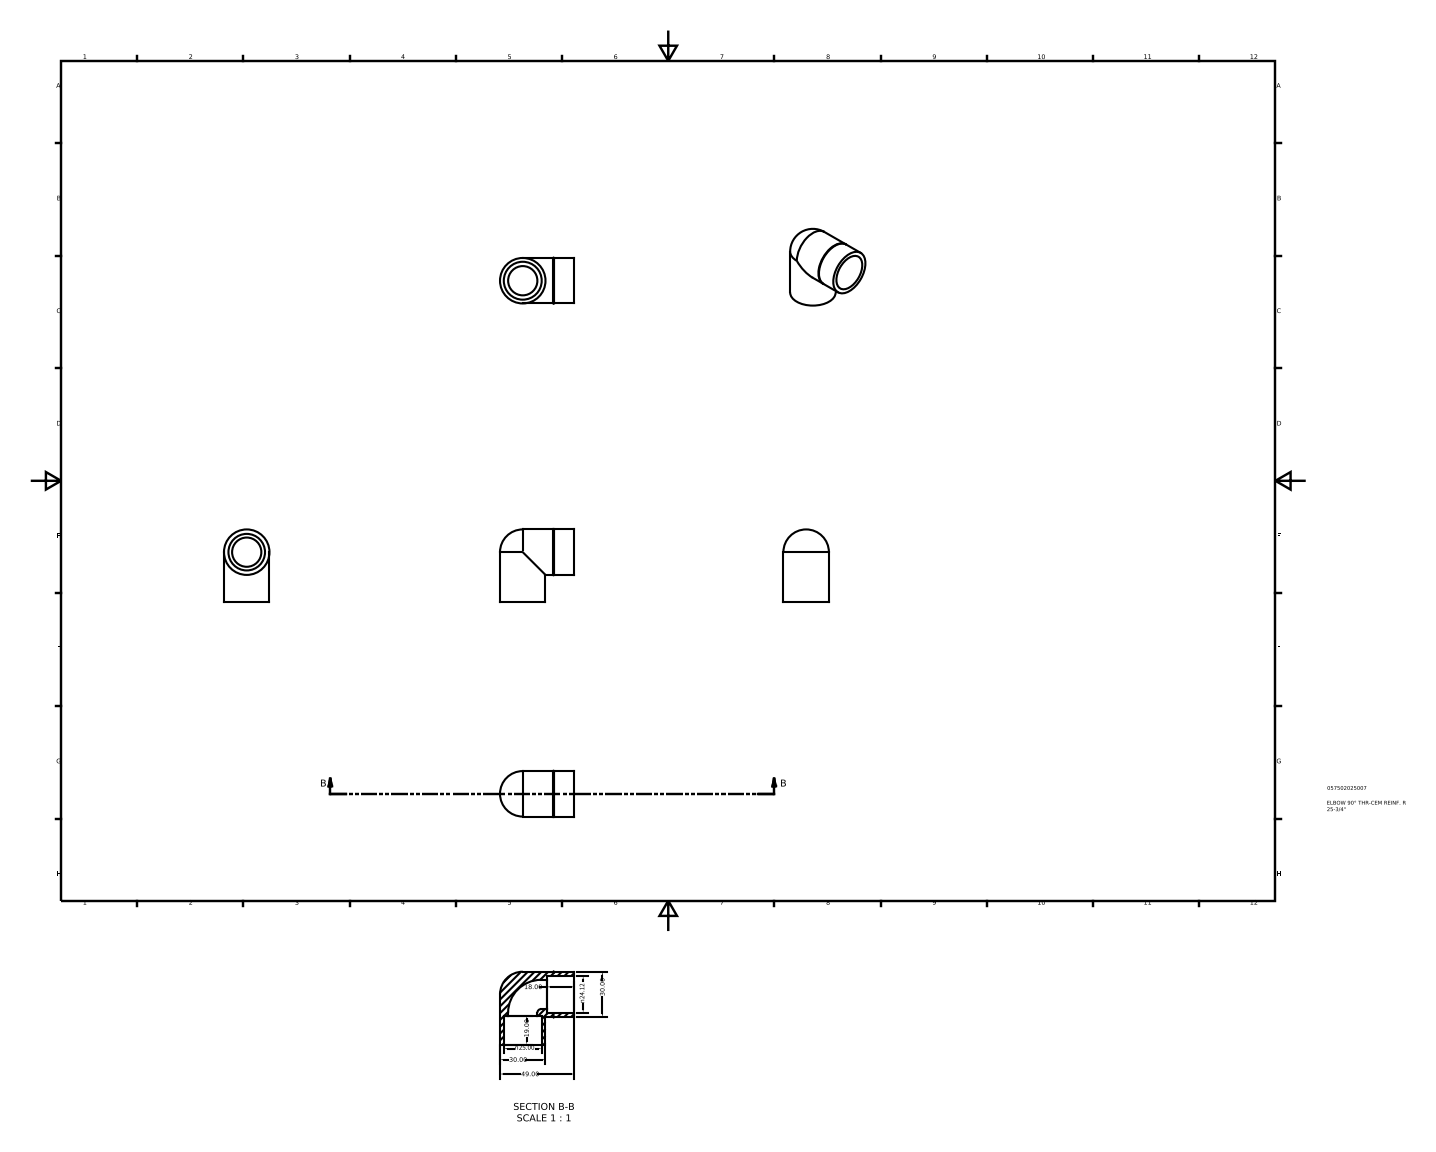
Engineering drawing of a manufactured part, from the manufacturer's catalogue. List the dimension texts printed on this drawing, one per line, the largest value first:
49.00
30.00
30.00
n25.00
n24.12
19.00
18.00
